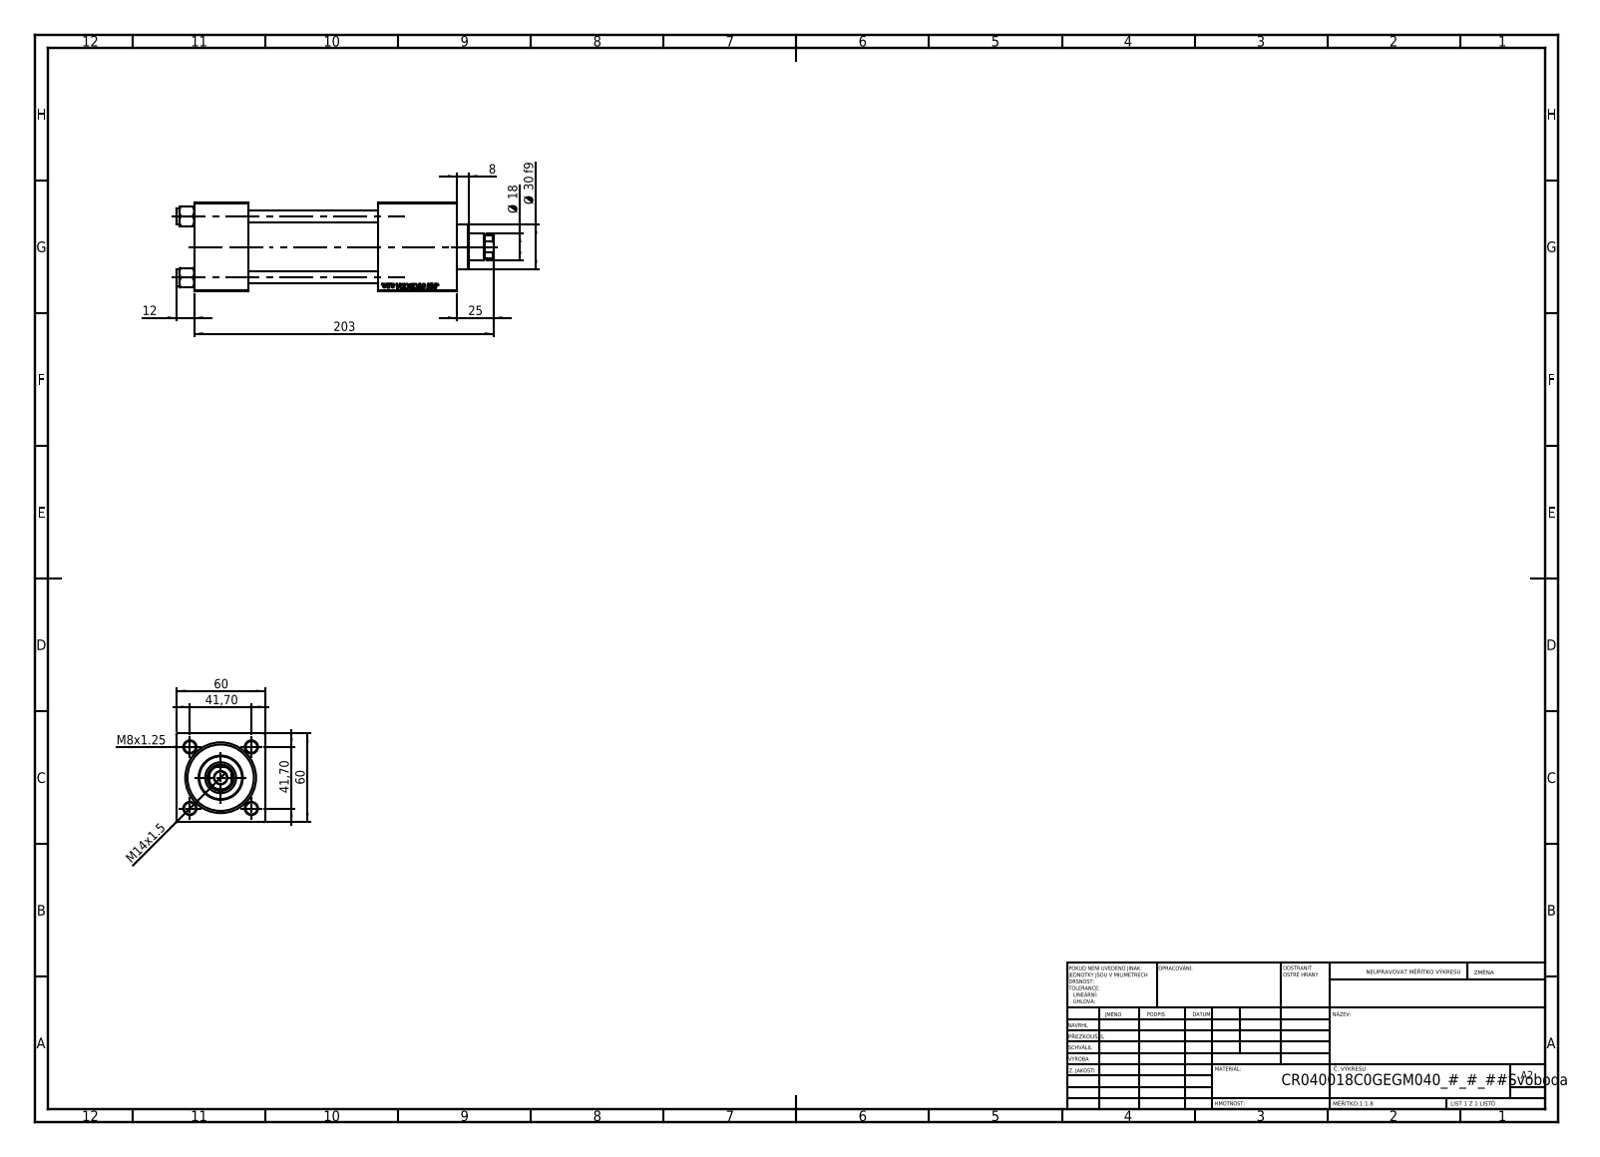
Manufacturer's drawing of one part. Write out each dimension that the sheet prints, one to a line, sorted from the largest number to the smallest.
203
60
60
41,70
41,70
Ø 30 f9
25
Ø 18
M14x1.5
12
8
M8x1.25
